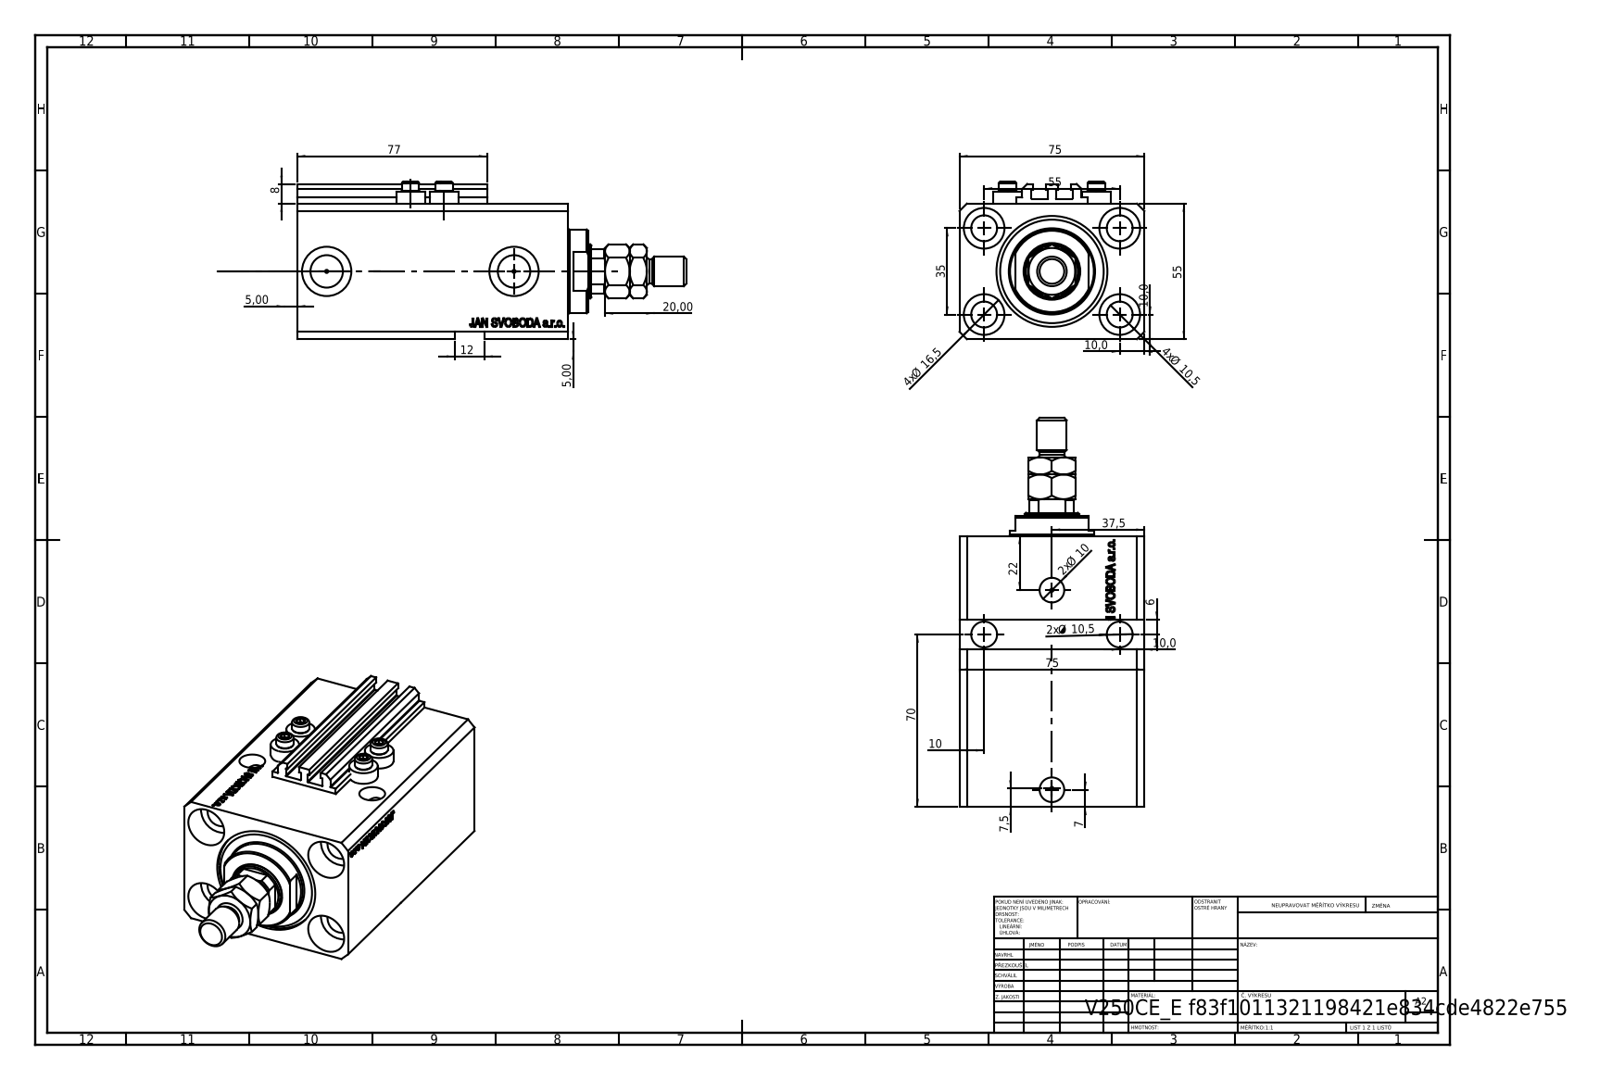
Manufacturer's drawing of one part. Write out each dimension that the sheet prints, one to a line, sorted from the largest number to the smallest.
77
75
75
70
55
55
37,5
35
22
20,00
4x Ø 16,5
12
4x Ø 10,5
2x Ø 10,5
10,0
10,0
2x Ø 10
10,0
10
8
7,5
7
6
5,00
5,00
